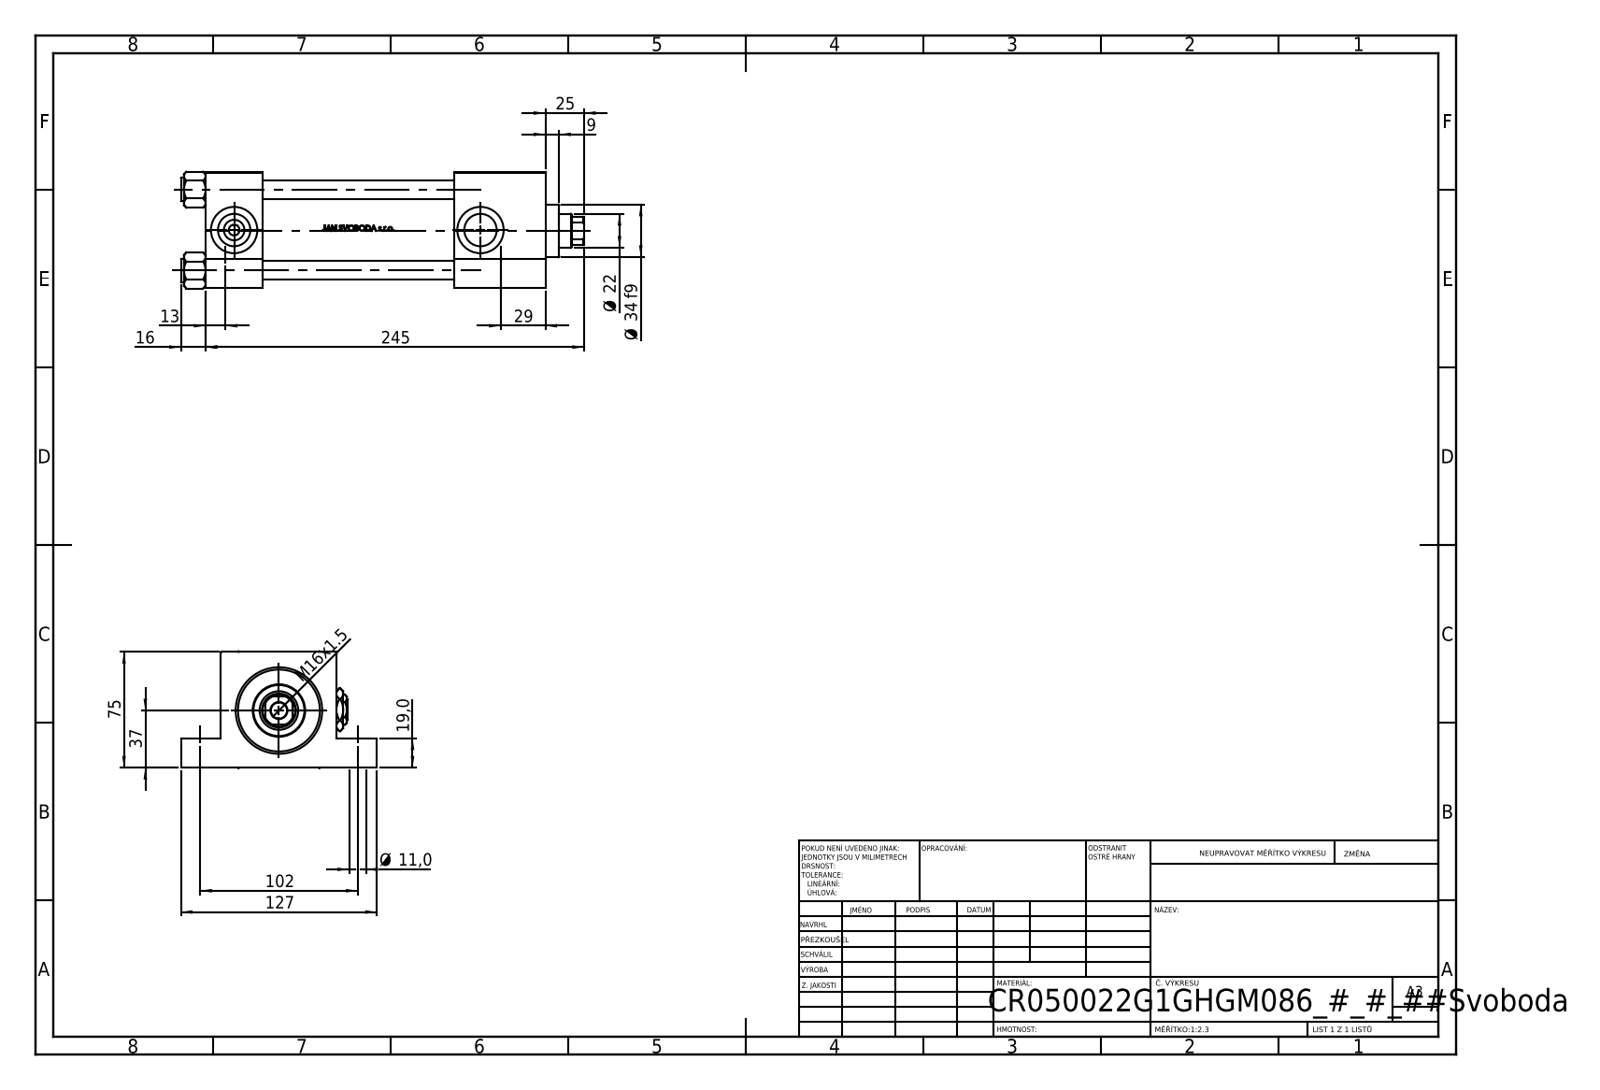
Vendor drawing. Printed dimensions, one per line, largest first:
245
127
102
75
37
Ø 34 f9
29
25
Ø 22
19,0
16
M16x1.5
13
Ø 11,0
9
